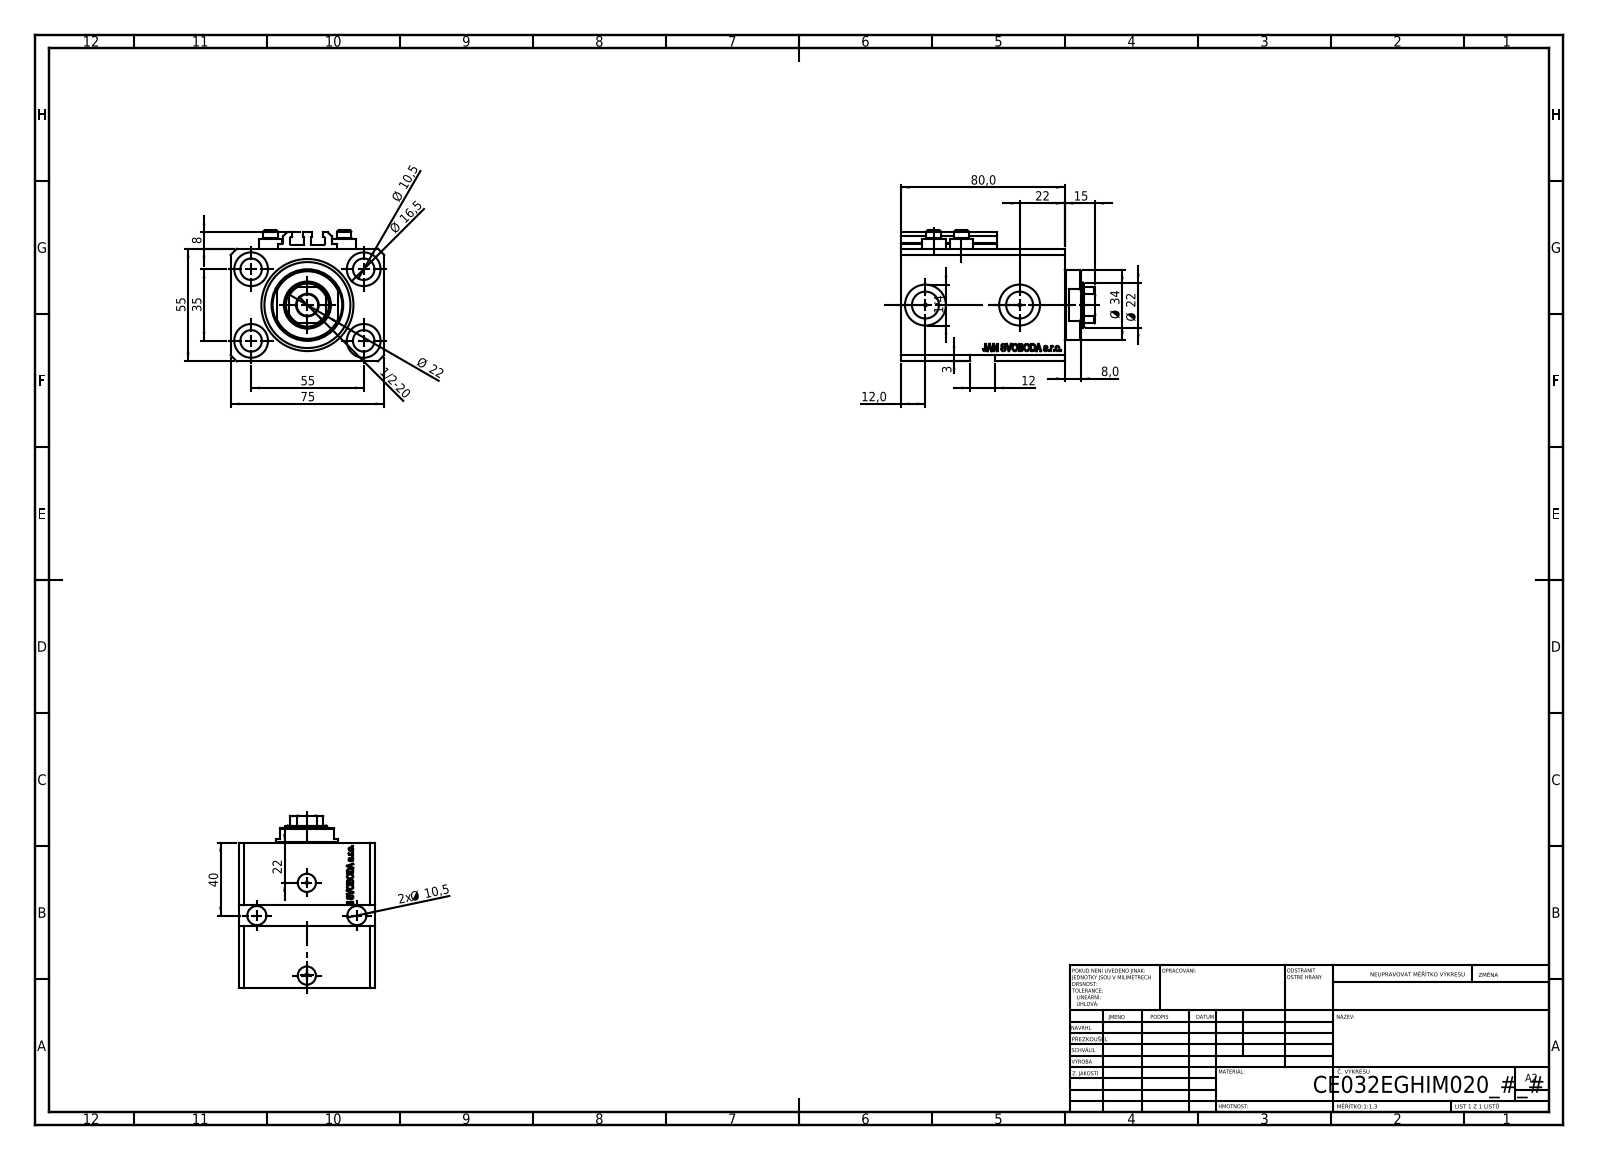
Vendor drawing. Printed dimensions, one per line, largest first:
80,0
75
55
55
40
35
Ø 34
Ø 22
22
Ø 22
22
Ø 16,5
15
12,0
12
Ø 10,5
2x Ø 10,5
8
8,0
3
1/2-20
1/4
